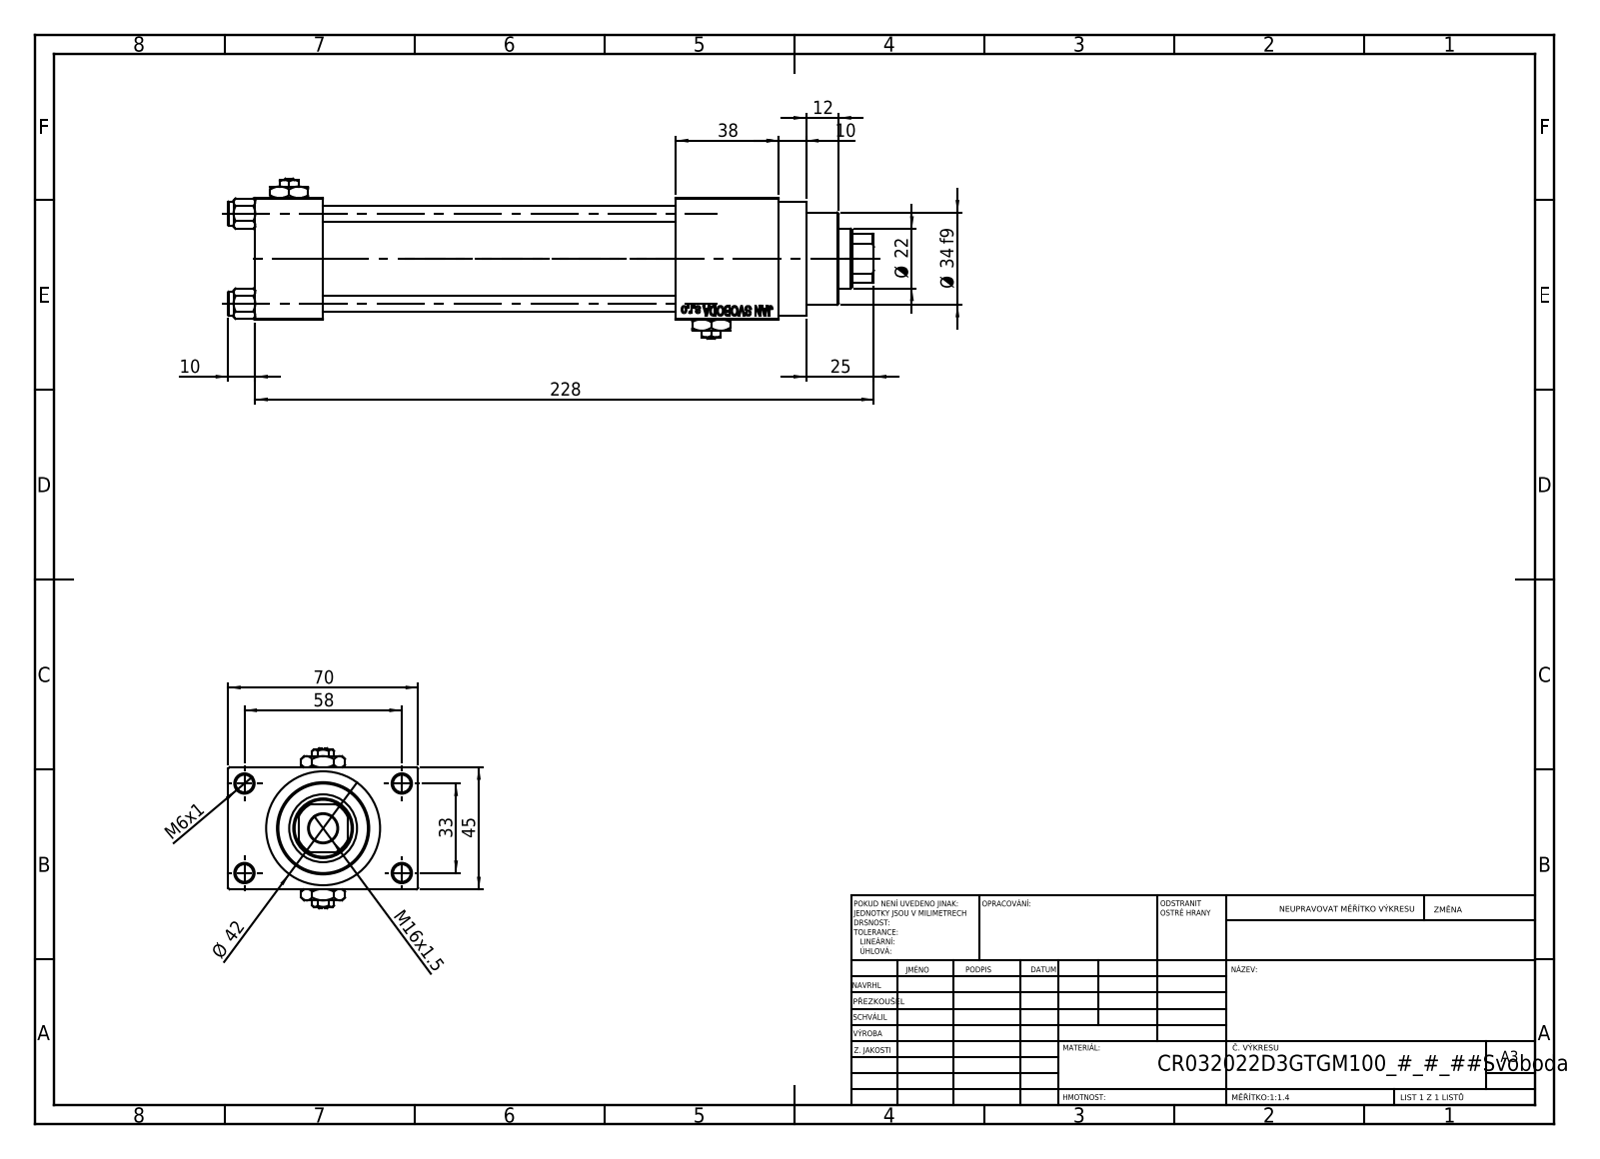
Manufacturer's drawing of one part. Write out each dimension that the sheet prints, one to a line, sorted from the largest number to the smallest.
228
70
58
45
Ø 42
38
Ø 34 f9
33
25
Ø 22
M16x1.5
12
10
10
M6x1
